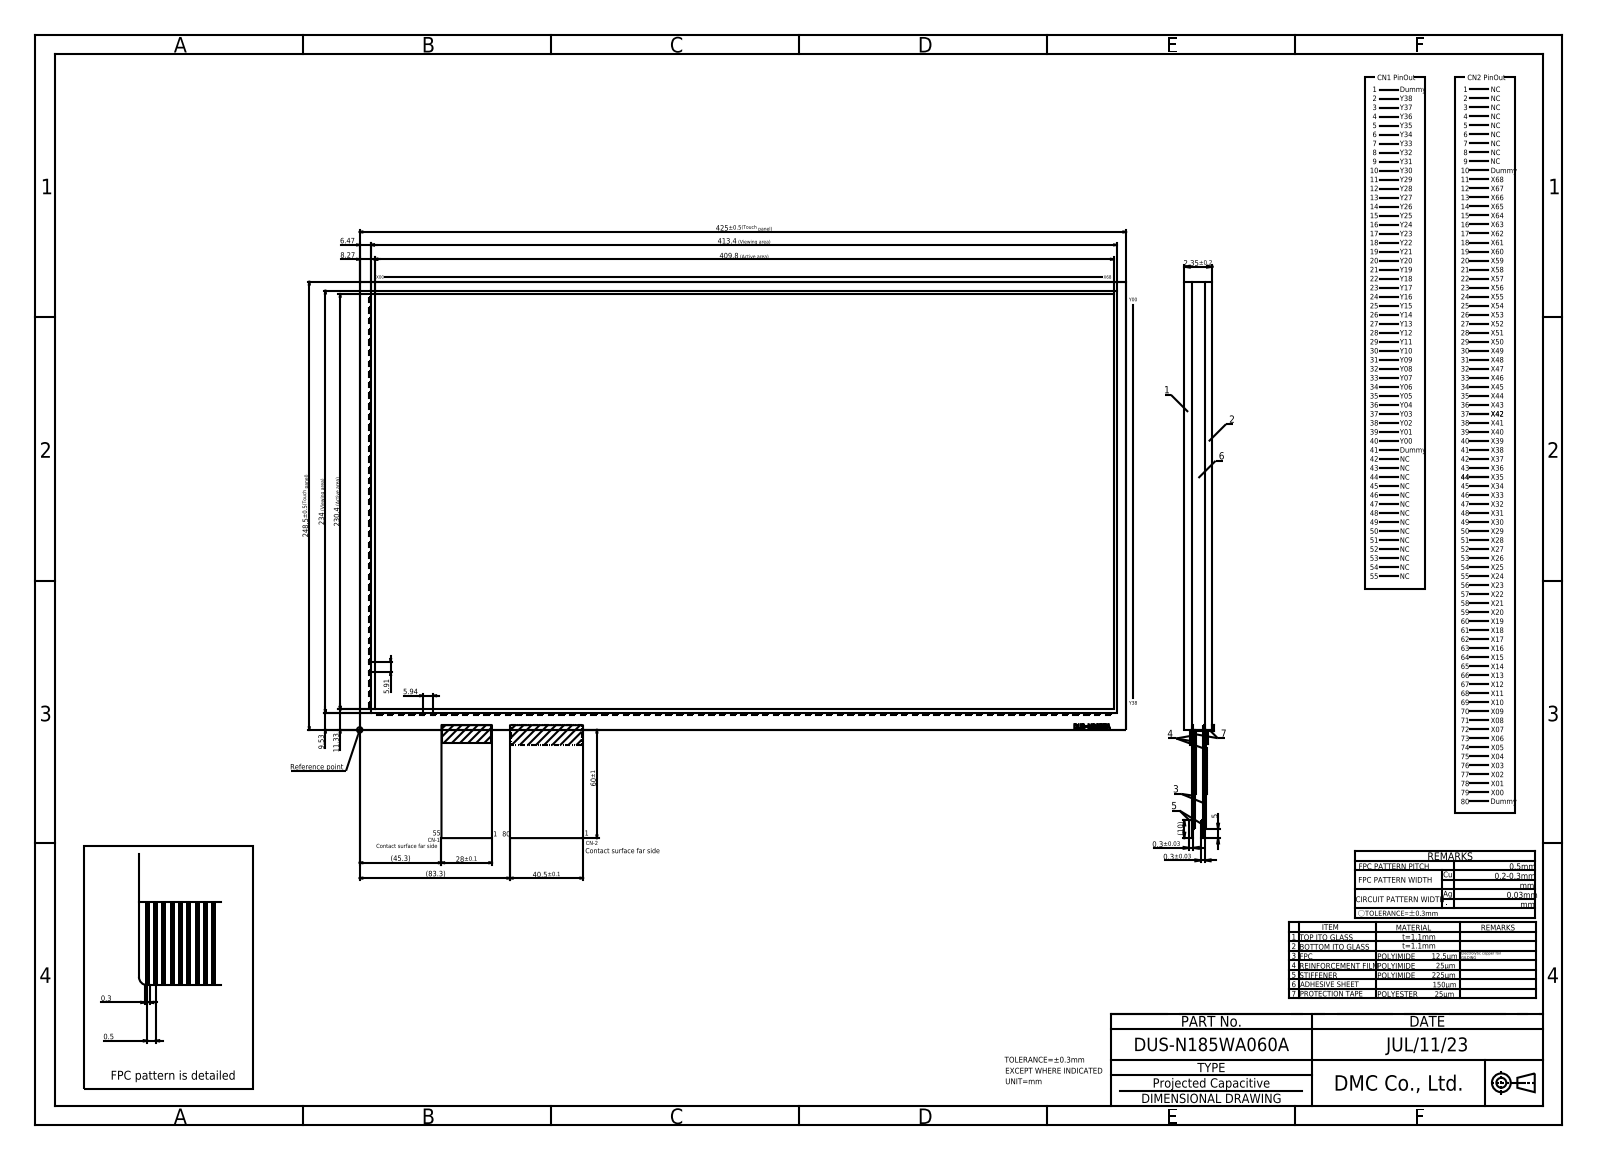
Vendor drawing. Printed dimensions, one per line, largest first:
425±0.5(Touch panel)
413.4 (Viewing area)
409.8 (Active area)
248.5±0.5(Touch panel)
234 (Viewing area)
230.4 (Active area)
(83.3)
60±1
(45.3)
40.5±0.1
28±0.1
11.33
(10)
9.53
8.27
6.47
5.94
5.91
5
2.35±0.2
0.5
0.3
0.3±0.03
0.3±0.03
